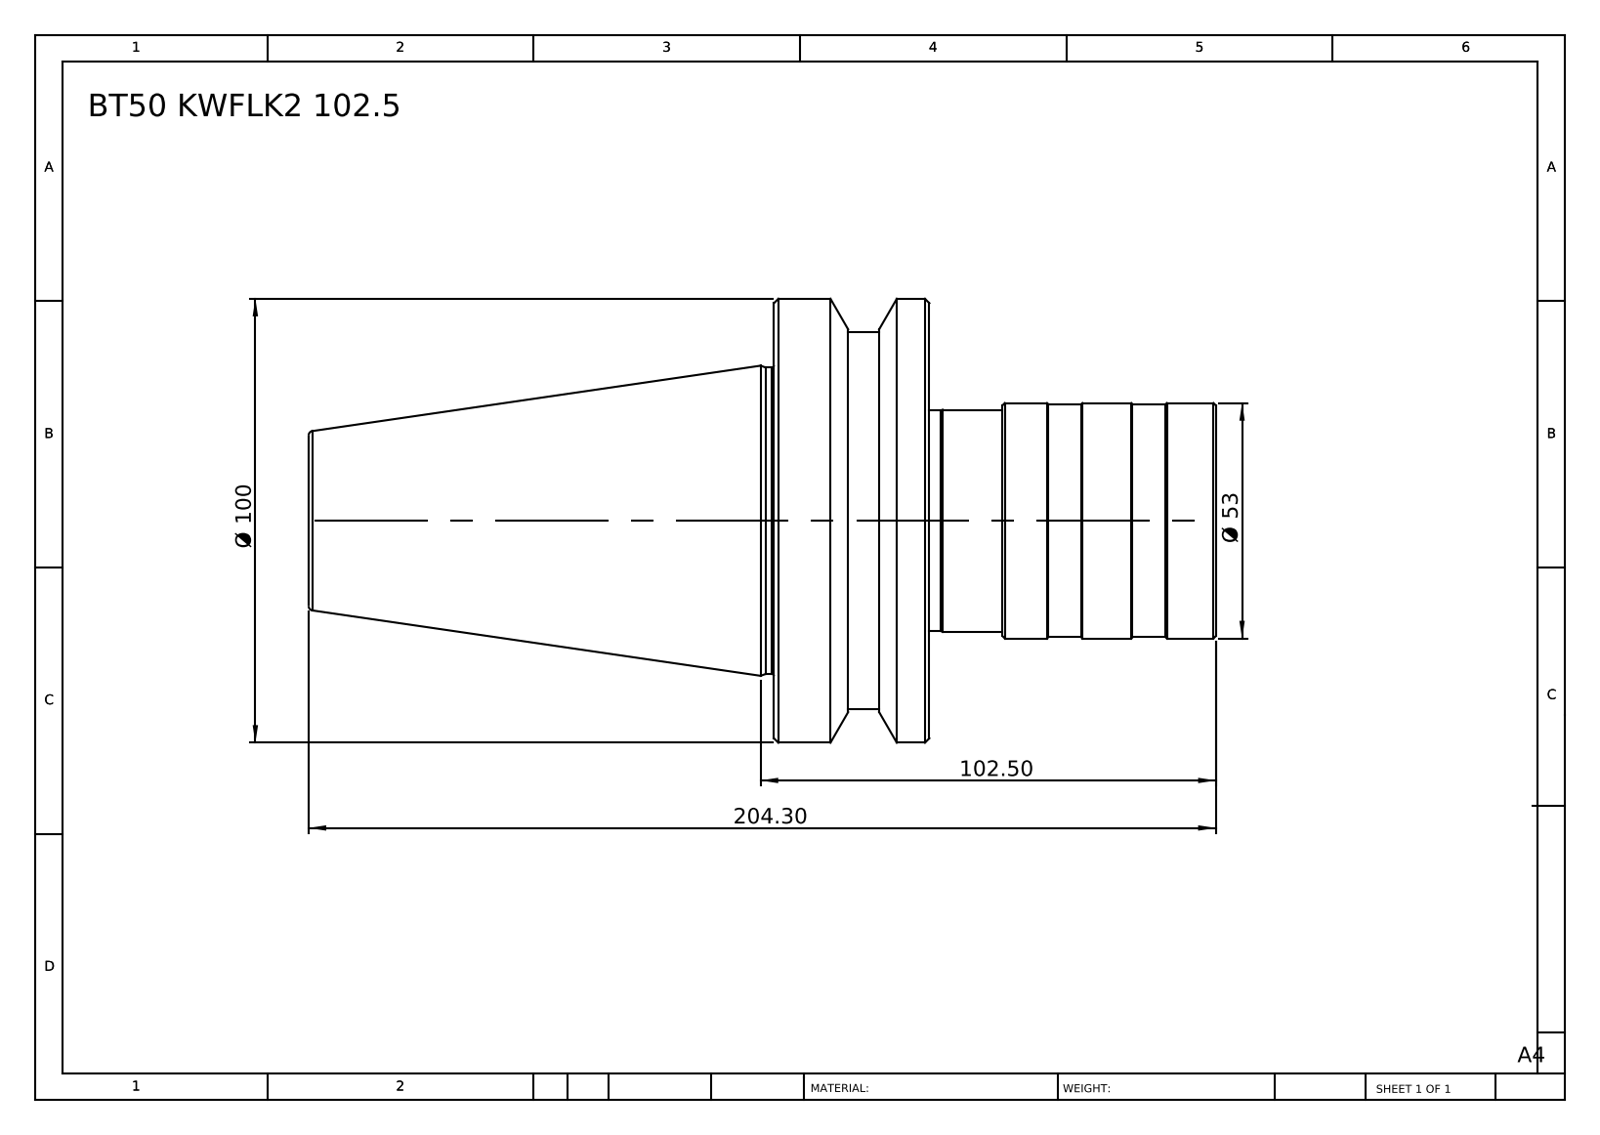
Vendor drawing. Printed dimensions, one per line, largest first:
204.30
102.50
Ø 100
Ø 53
